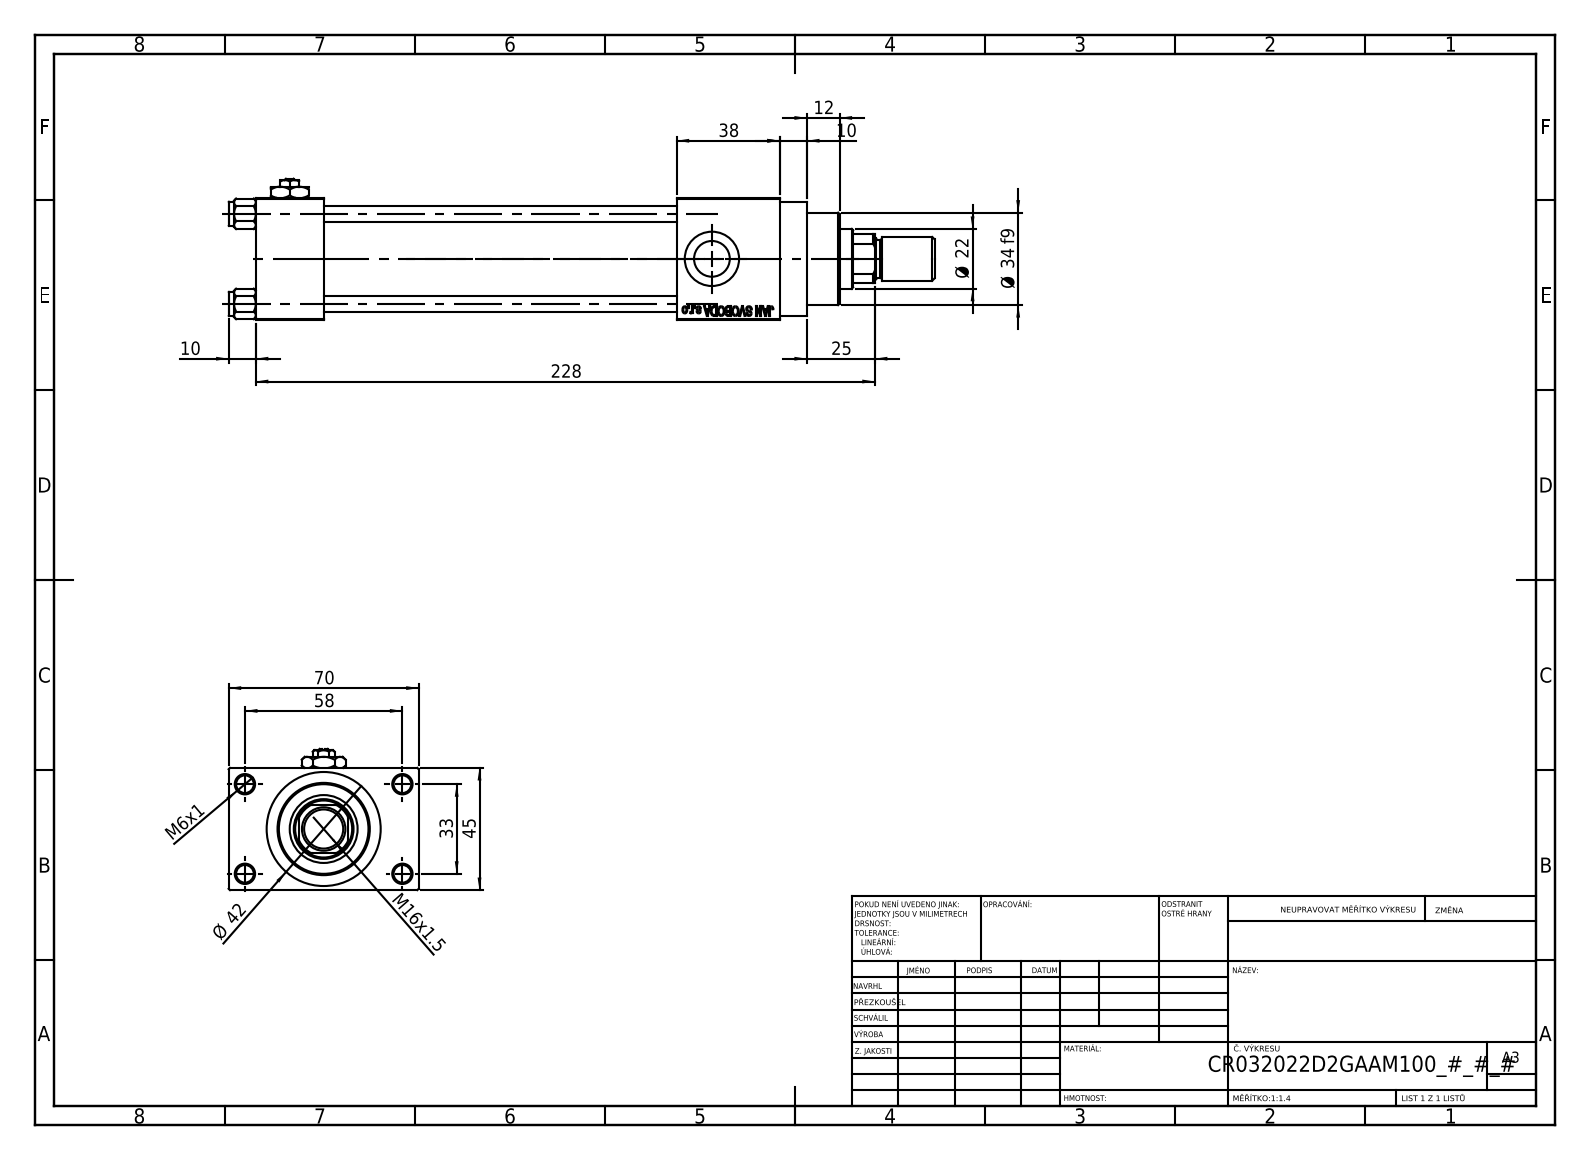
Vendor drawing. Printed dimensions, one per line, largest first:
228
70
58
45
Ø 42
38
Ø 34 f9
33
25
Ø 22
M16x1.5
12
10
10
M6x1
